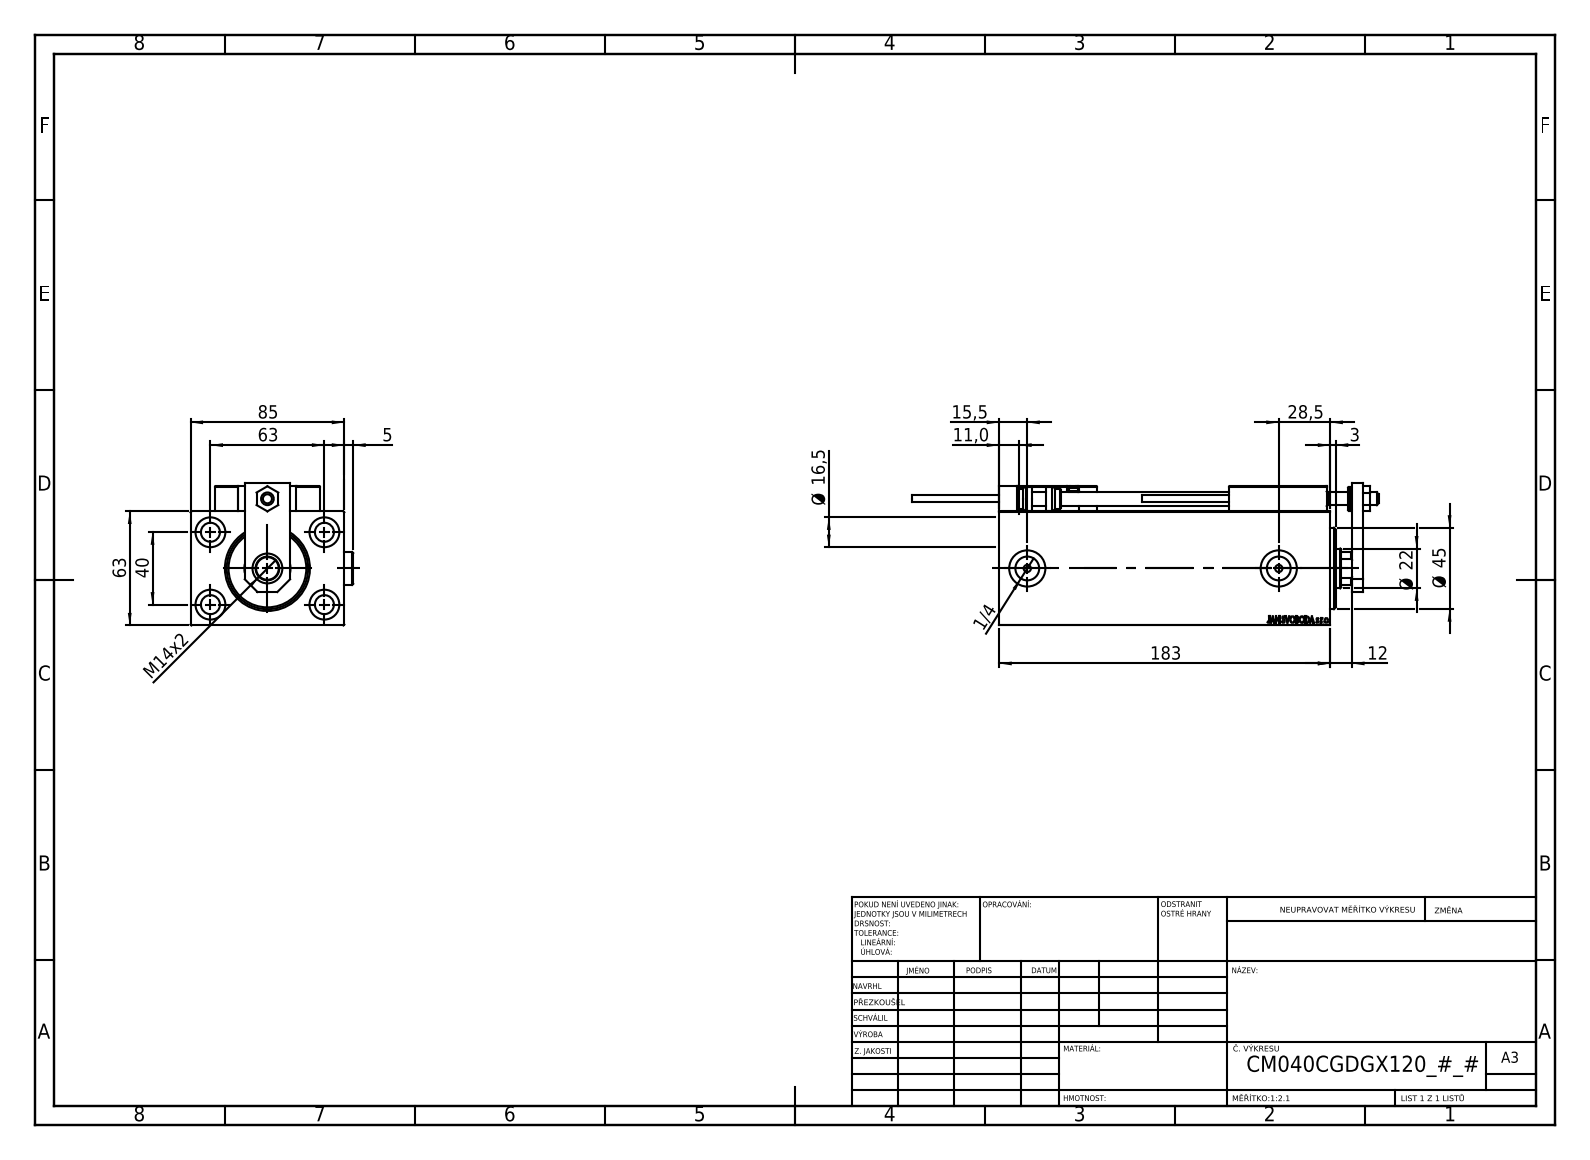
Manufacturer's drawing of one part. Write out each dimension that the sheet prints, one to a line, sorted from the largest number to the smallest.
183
85
63
63
Ø 45
40
28,5
Ø 22
Ø 16,5
15,5
M14x2
12
11,0
5
3
1/4
